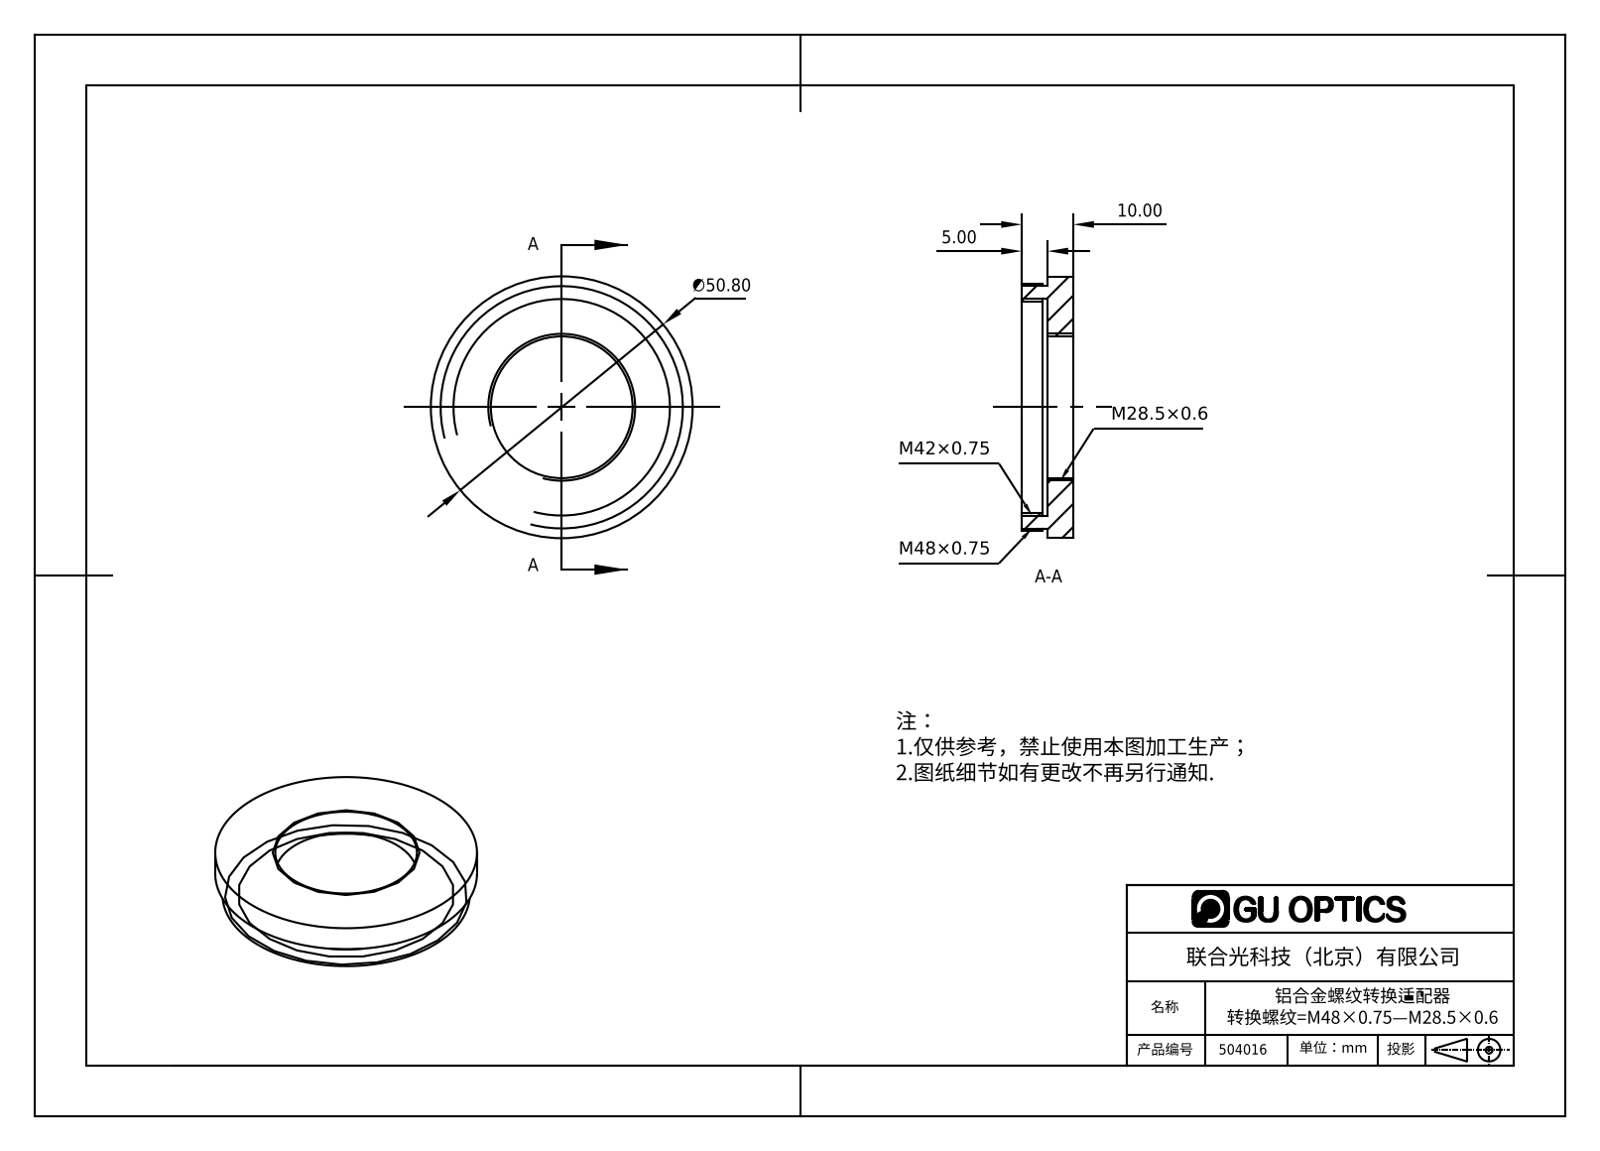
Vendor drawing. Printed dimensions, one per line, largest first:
∅50.80
10.00
5.00
